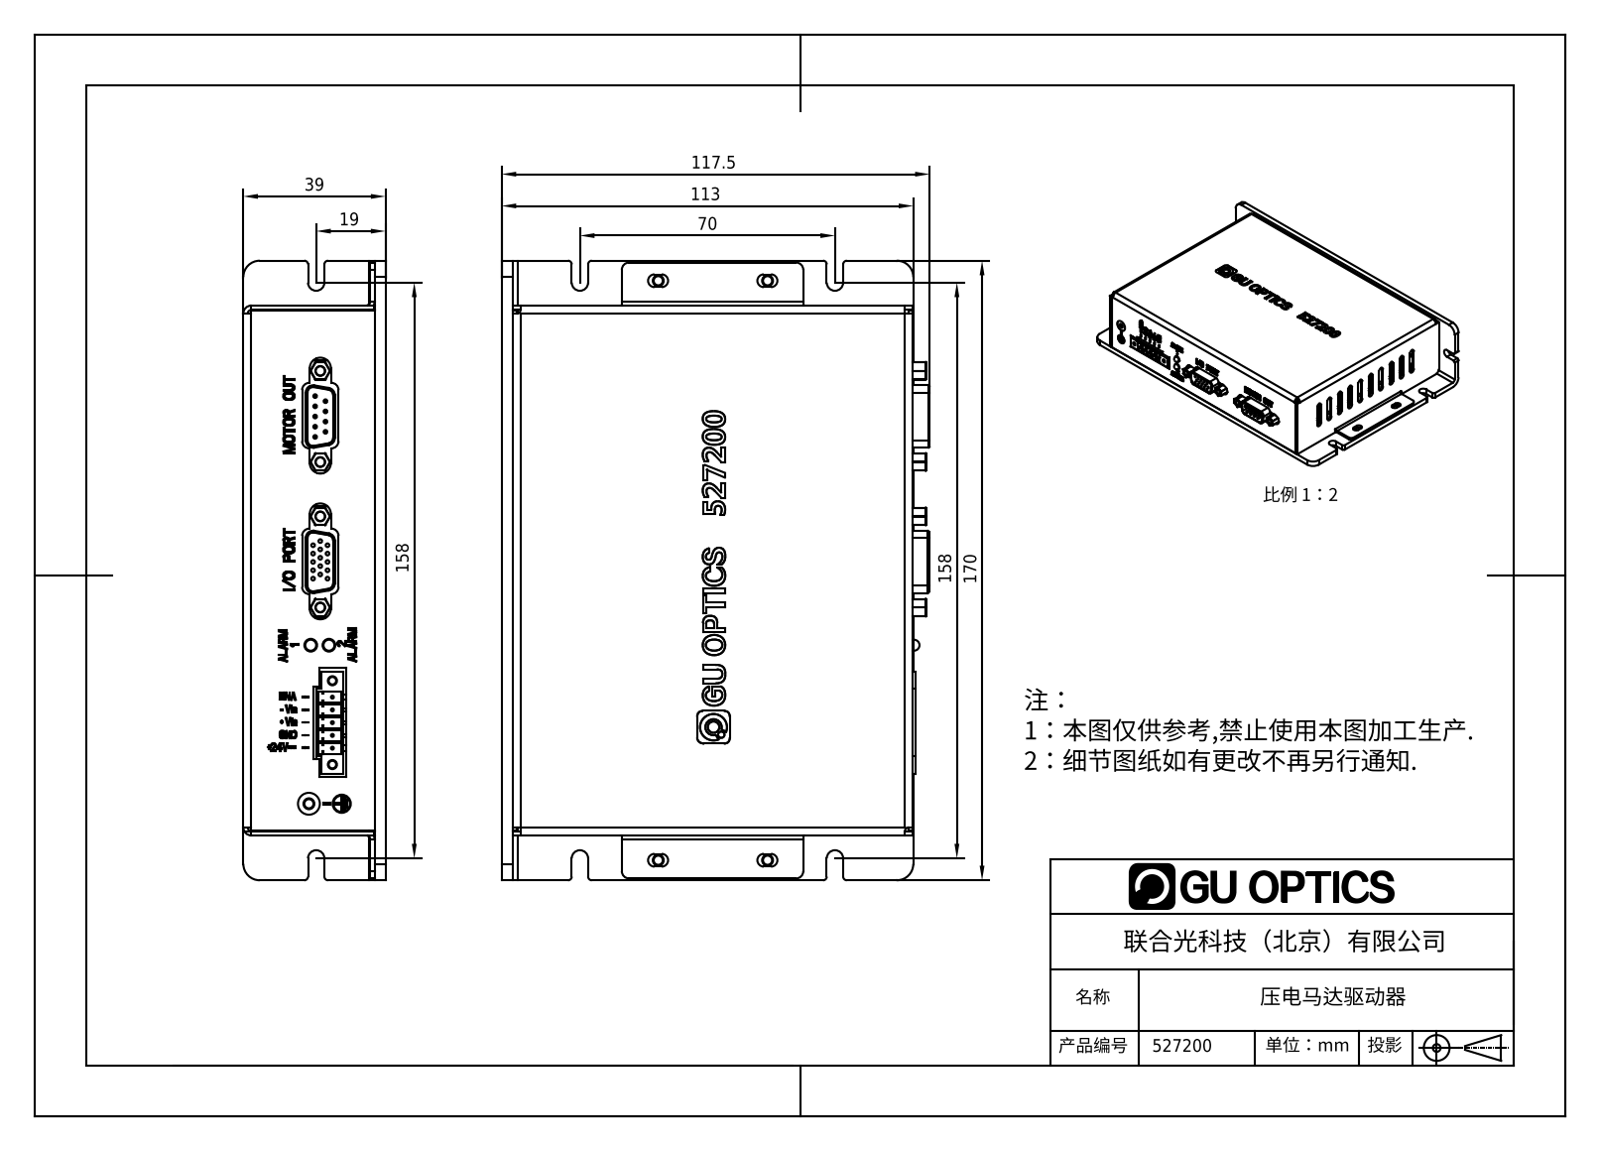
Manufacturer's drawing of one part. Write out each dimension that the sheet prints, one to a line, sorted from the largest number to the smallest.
170
158
158
117.5
113
70
39
19
